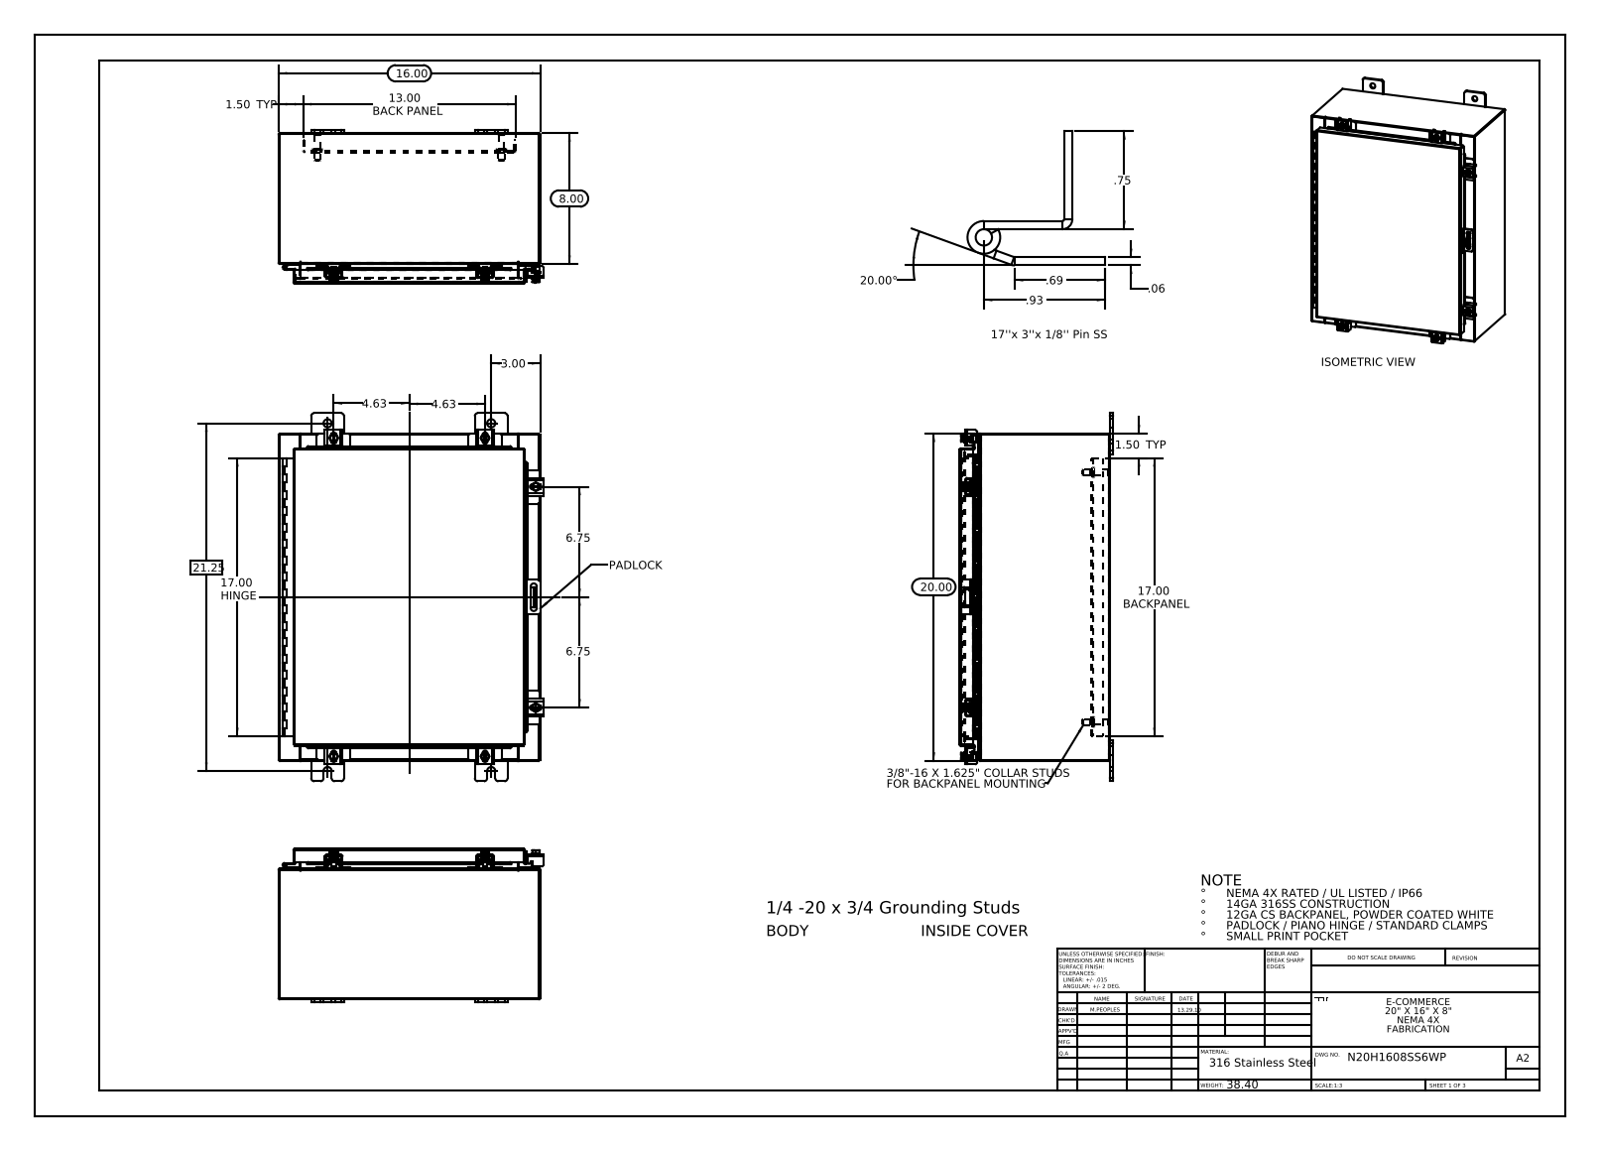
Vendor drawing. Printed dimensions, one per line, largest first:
21.25
20.00
20.00°
17.00 HINGE
17.00 BACKPANEL
16.00
13.00 BACK PANEL
8.00
6.75
6.75
4.63
4.63
3.00
1.50 TYP
1.50 TYP
.93
.75
.69
.06
